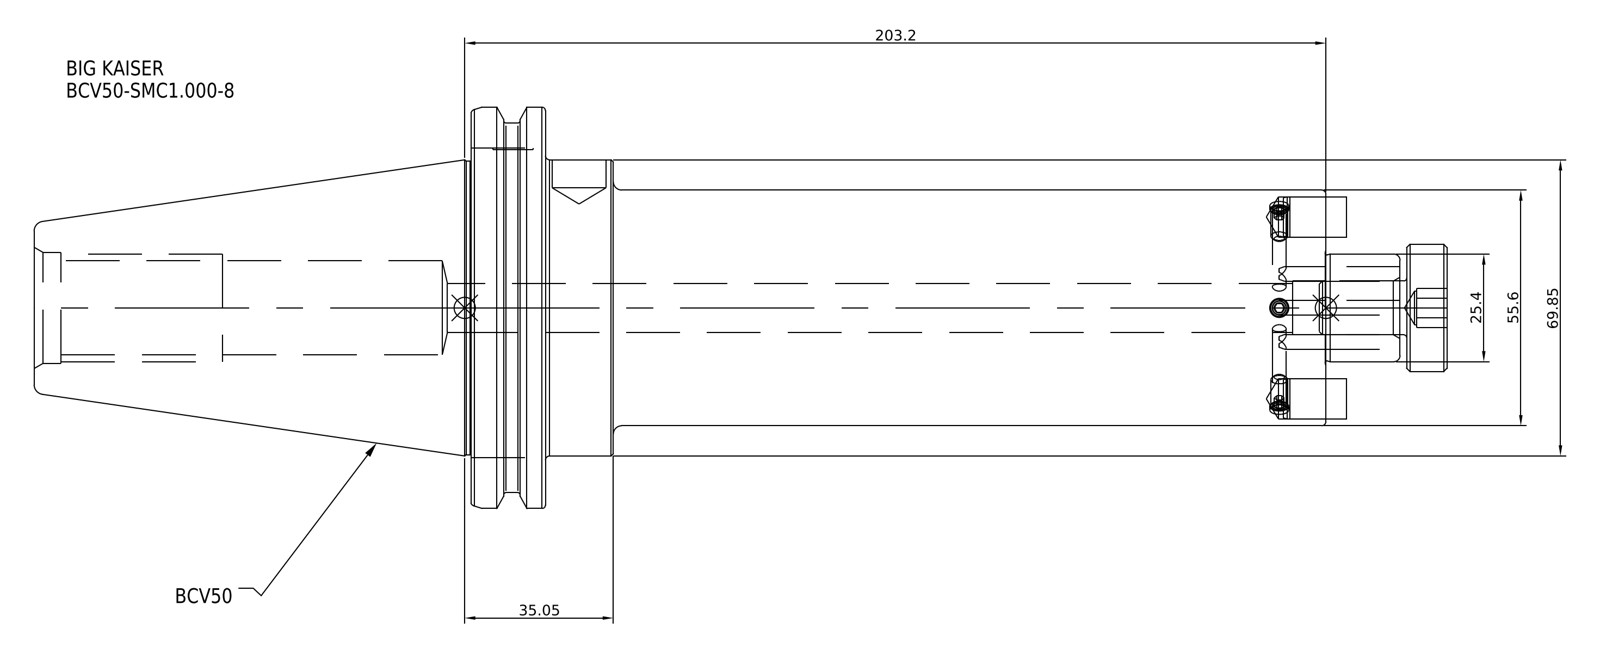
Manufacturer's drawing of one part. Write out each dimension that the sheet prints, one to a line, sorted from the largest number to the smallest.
203.2
69.85
55.6
35.05
25.4
